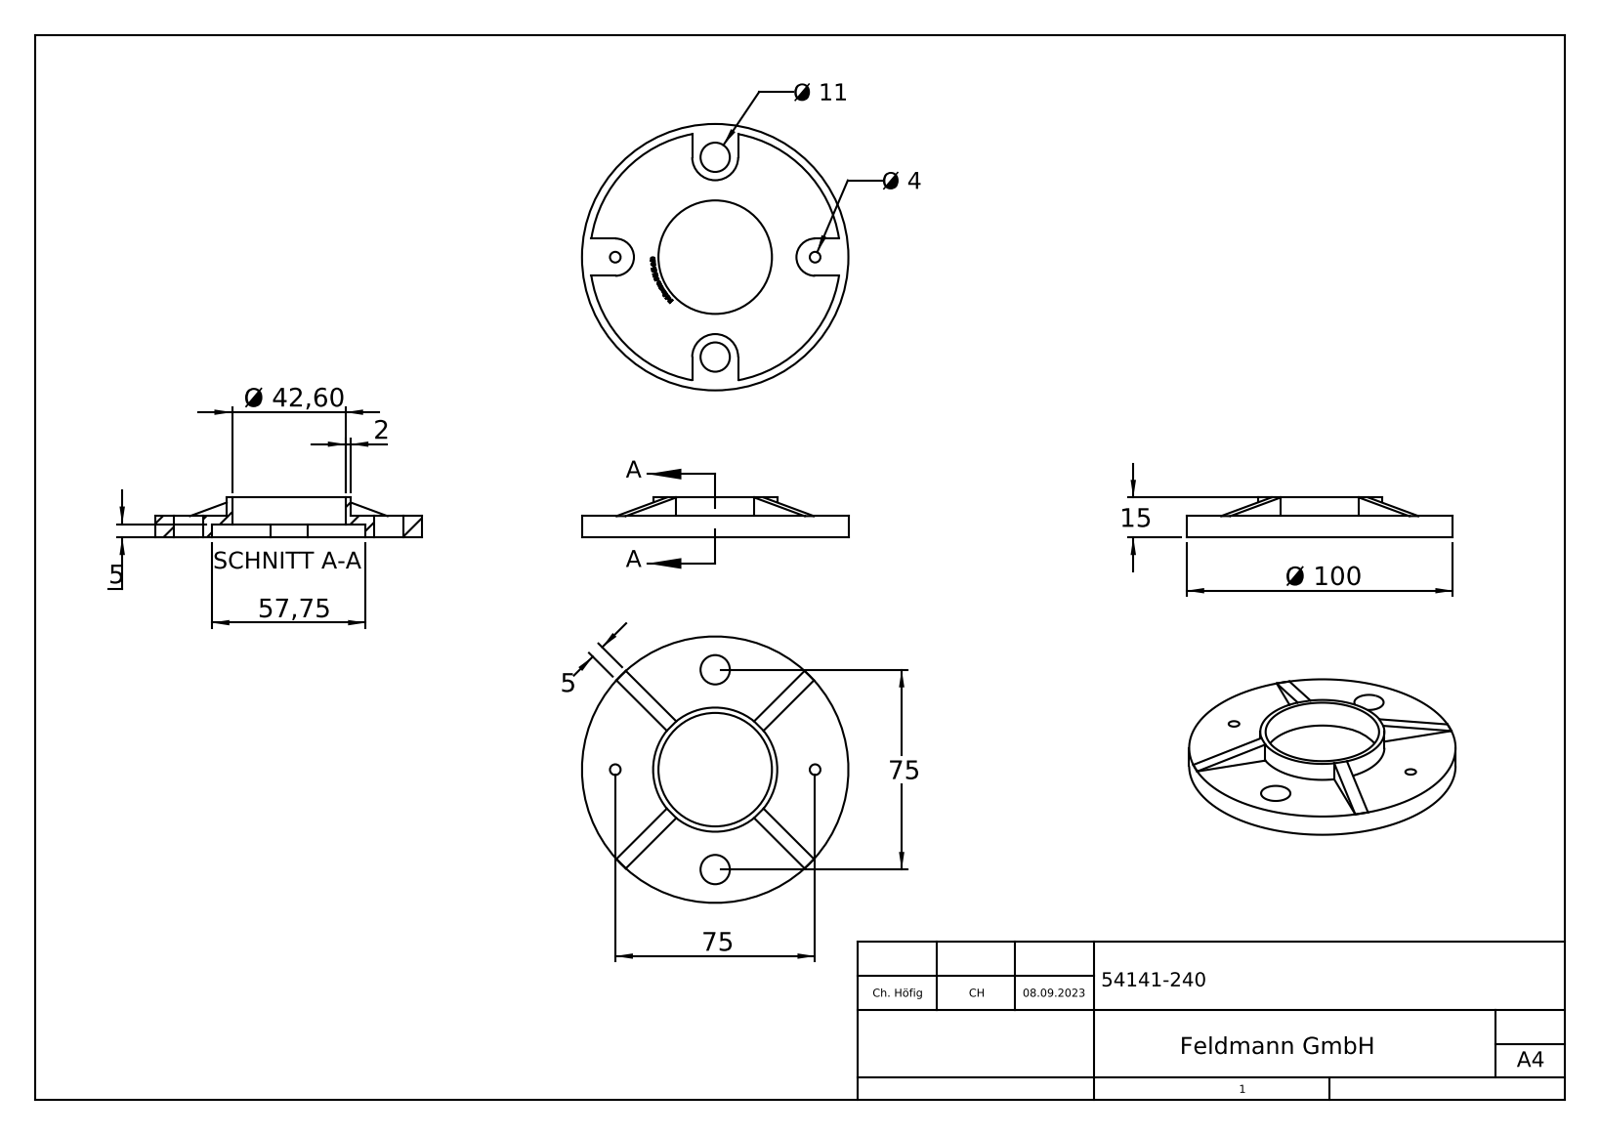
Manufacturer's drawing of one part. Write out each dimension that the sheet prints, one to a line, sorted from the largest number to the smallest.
Ø 100
75
75
57,75
Ø 42,60
15
Ø 11
5
5
Ø 4
2
